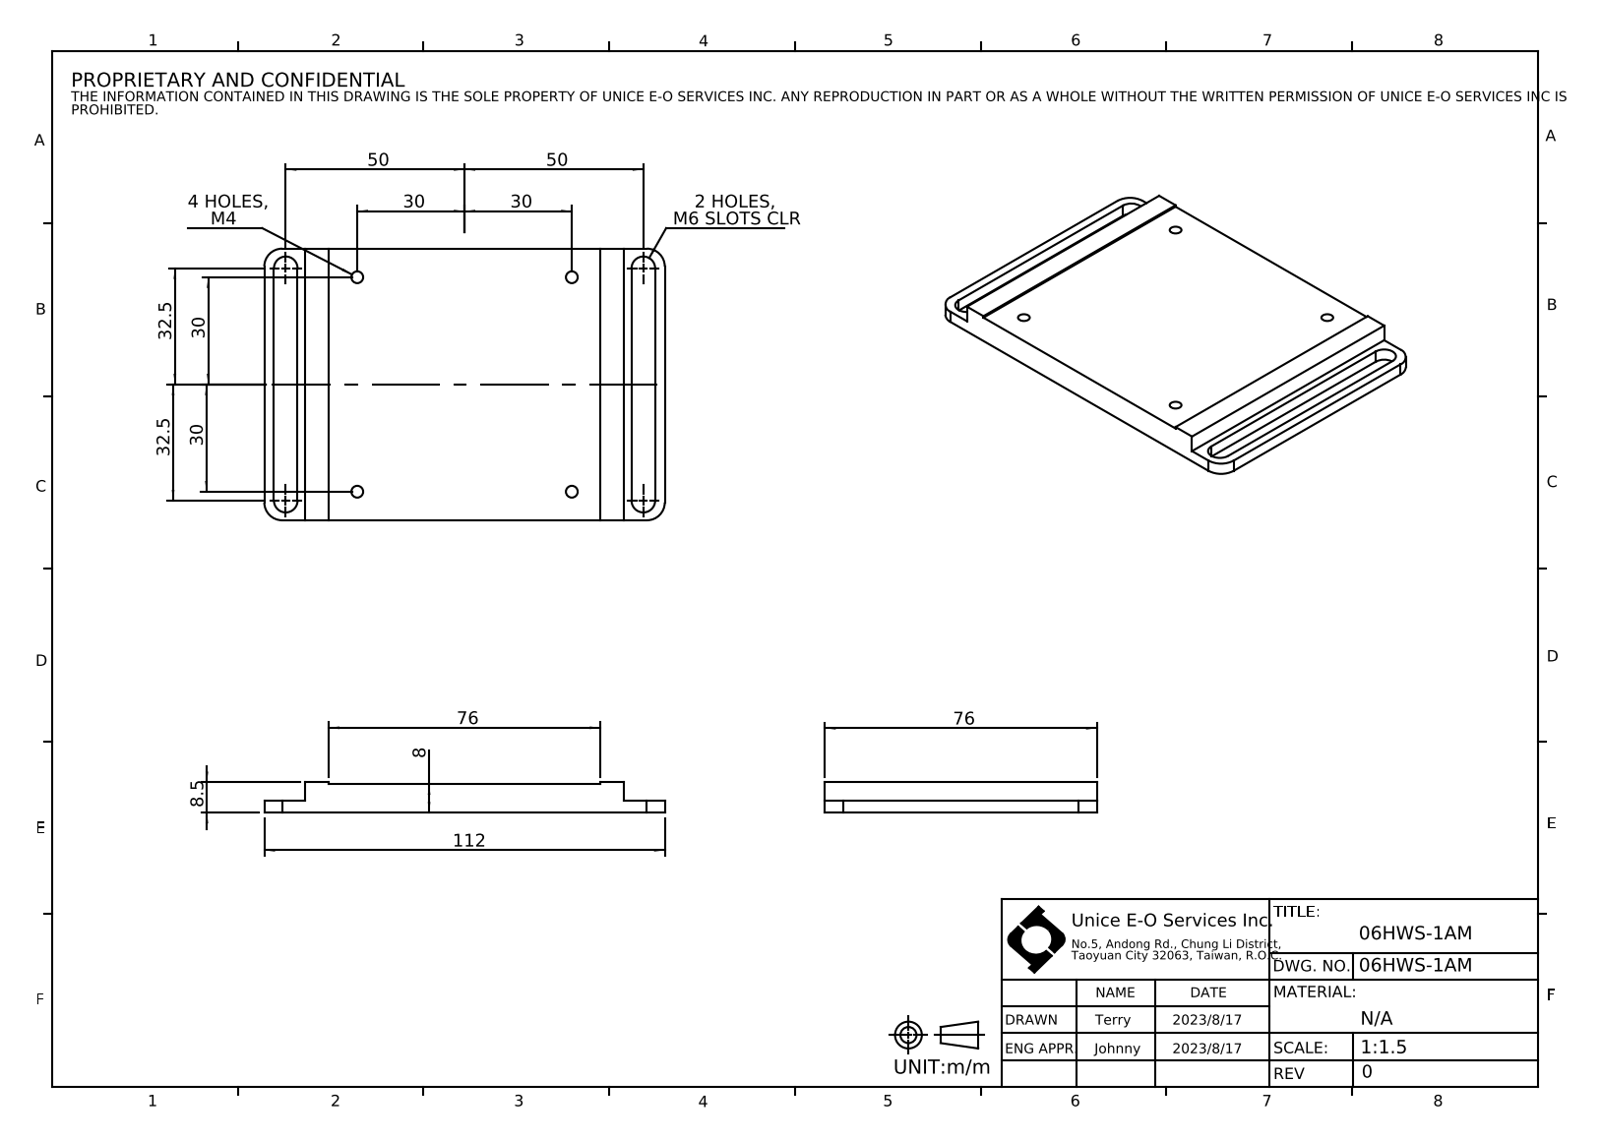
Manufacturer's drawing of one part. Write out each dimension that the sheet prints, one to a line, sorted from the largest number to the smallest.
112
76
76
50
50
32.5
32.5
30
30
30
30
8.5
8
4 HOLES, M4
2 HOLES, M6 SLOTS CLR
